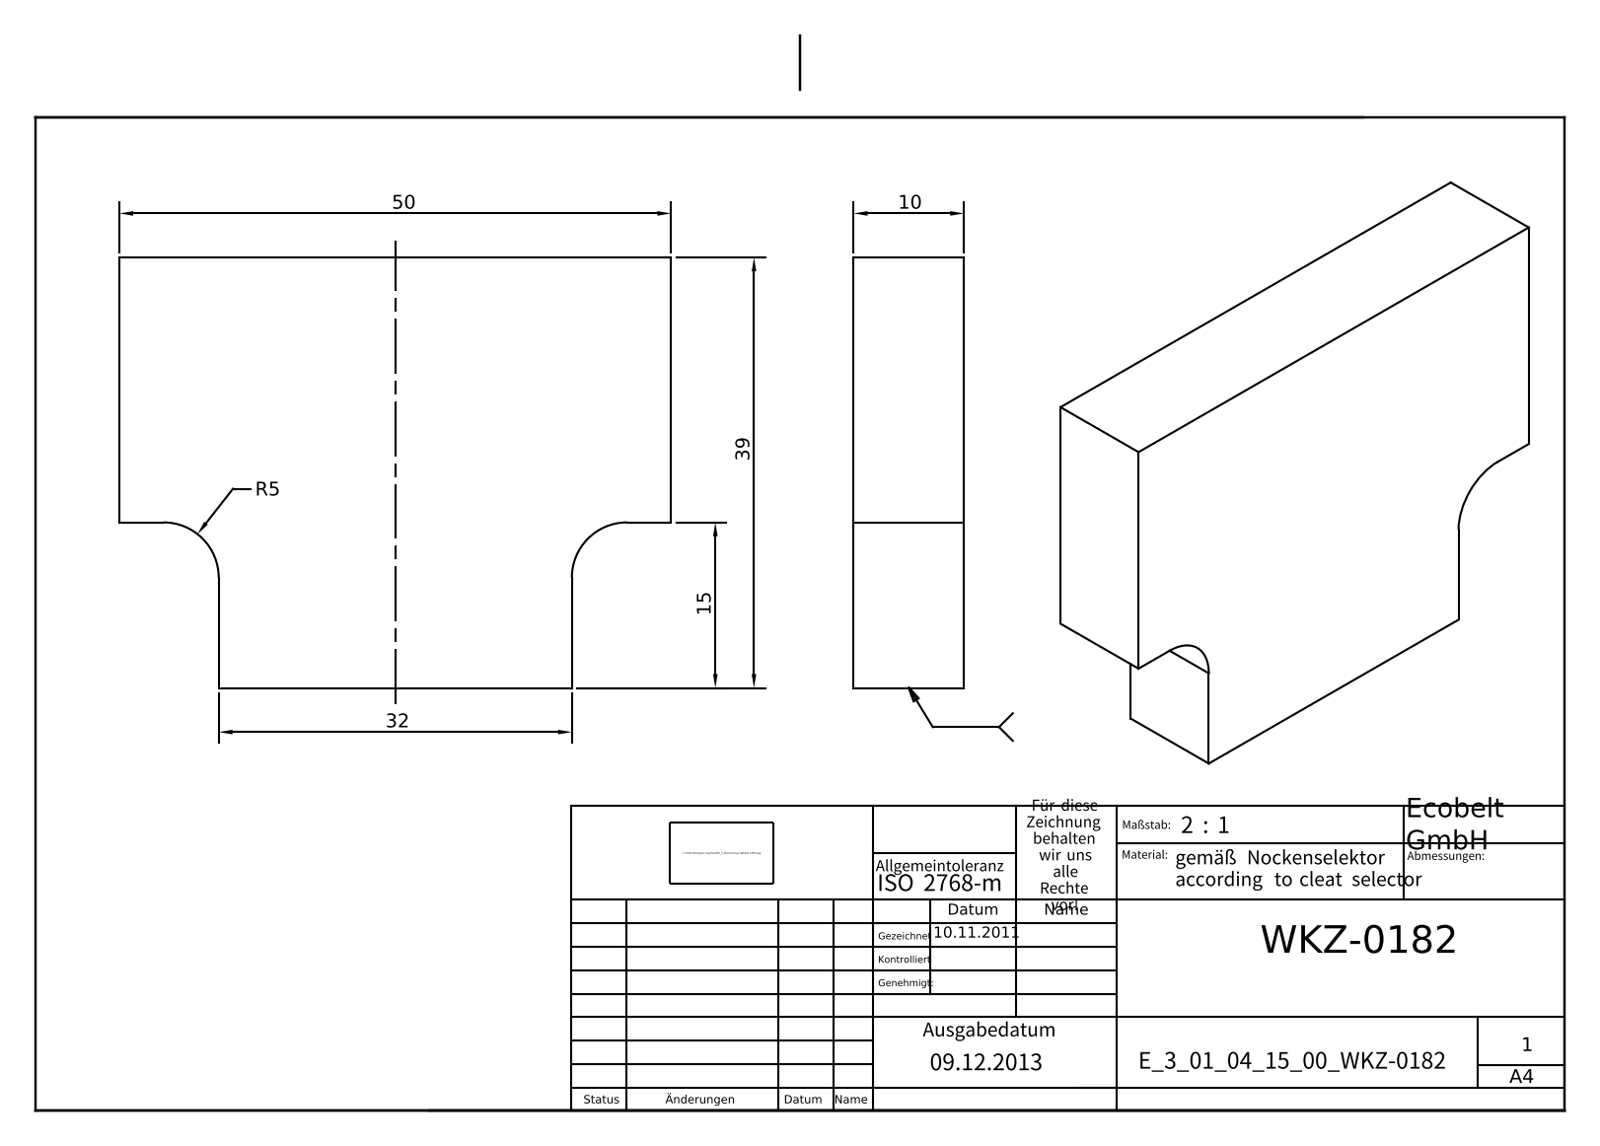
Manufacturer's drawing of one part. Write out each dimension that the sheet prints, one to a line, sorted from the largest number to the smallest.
50
39
32
15
10
R5
